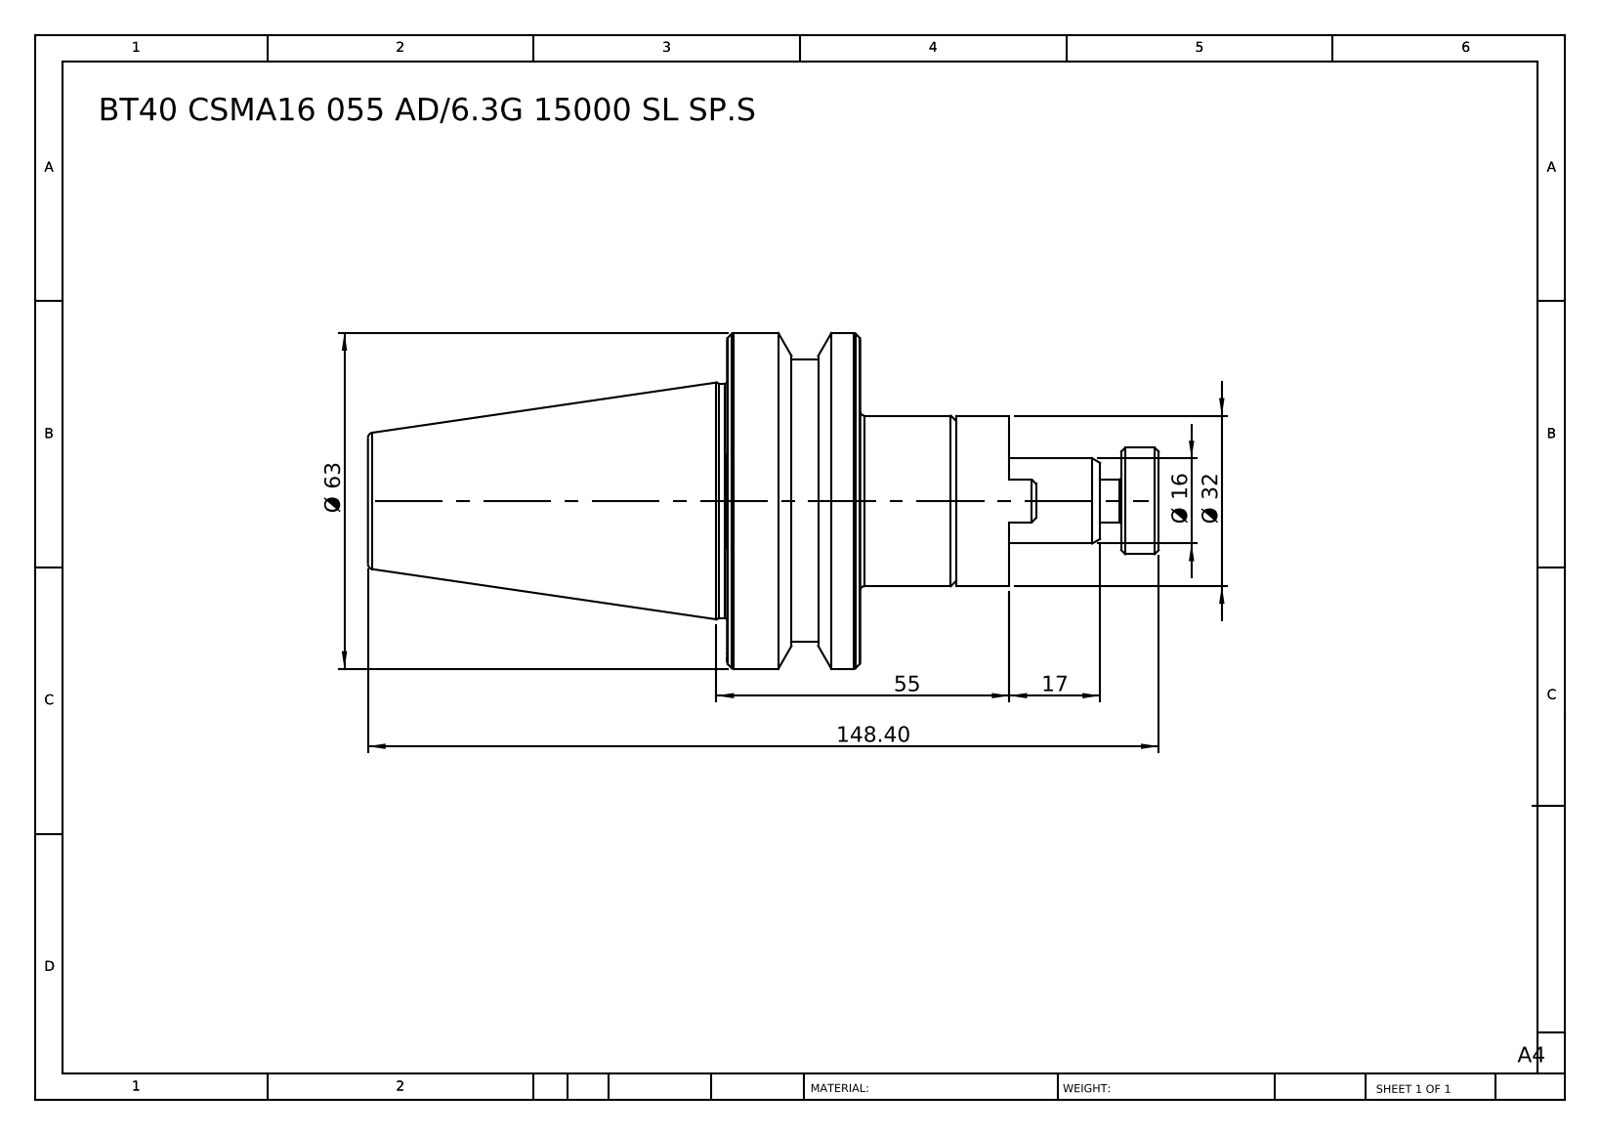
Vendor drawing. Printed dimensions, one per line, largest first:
148.40
Ø 63
55
Ø 32
17
Ø 16
